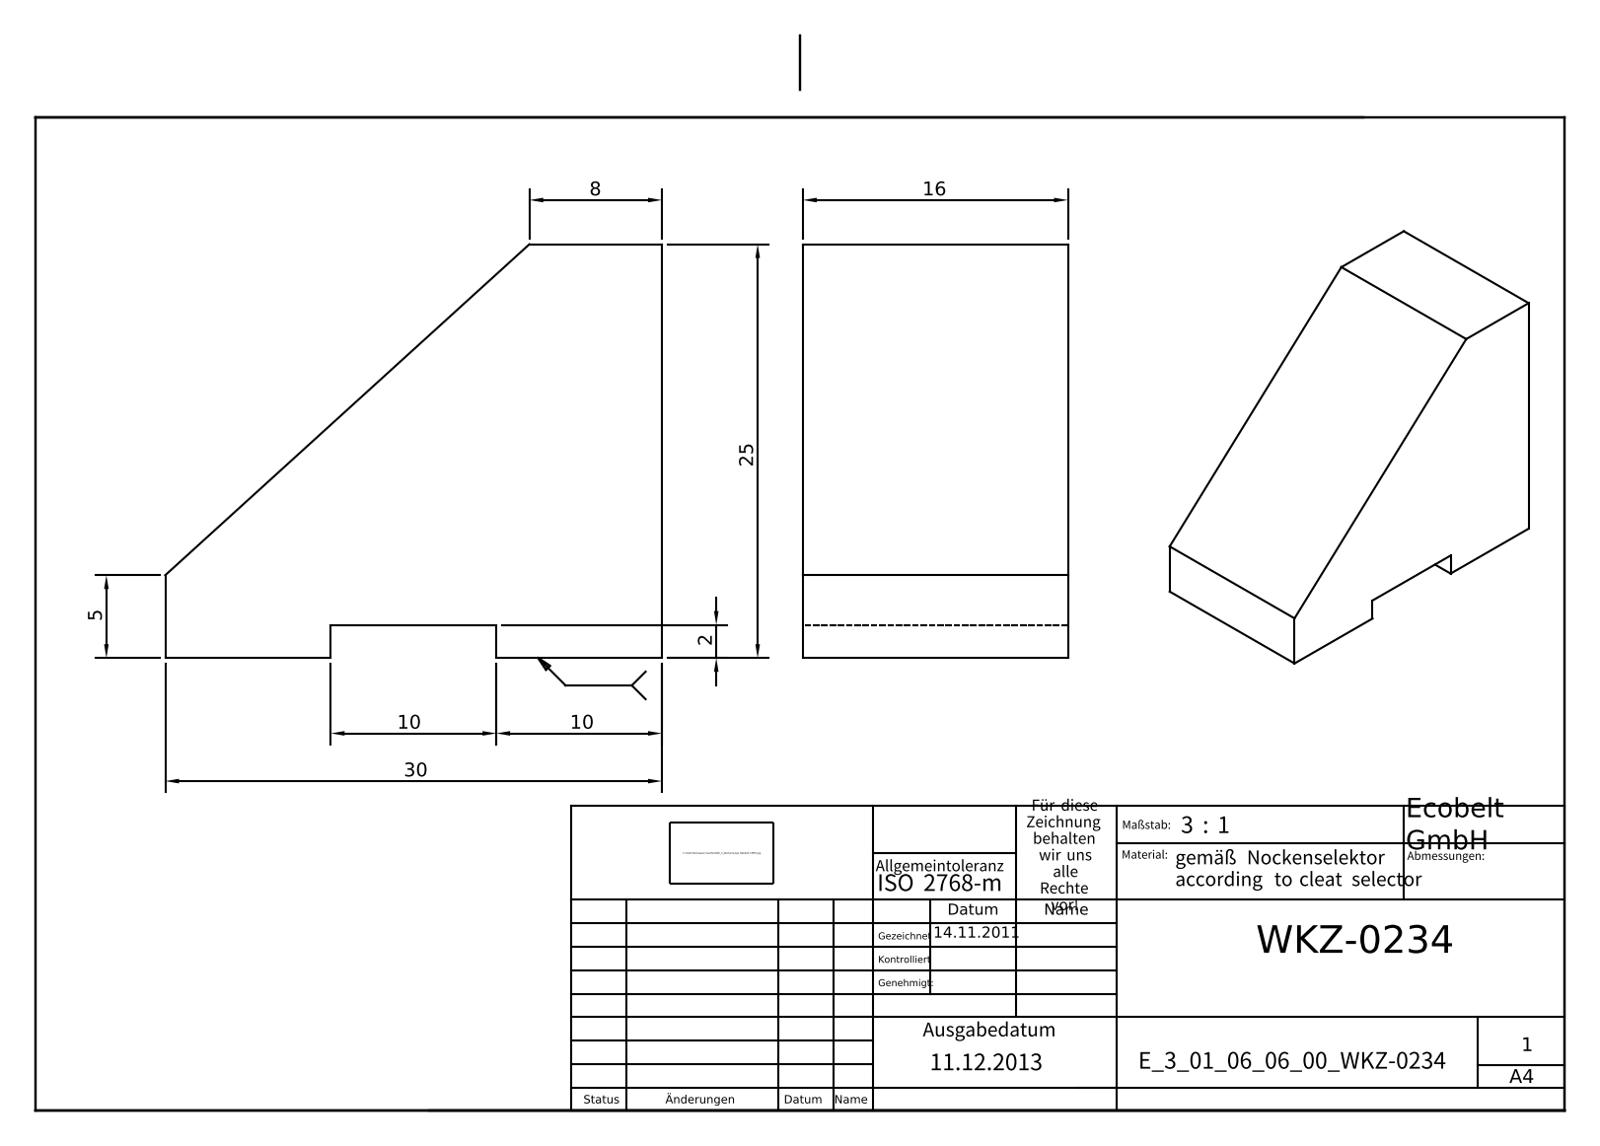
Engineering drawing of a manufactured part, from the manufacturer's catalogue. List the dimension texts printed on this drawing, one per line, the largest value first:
30
25
16
10
10
8
5
2
